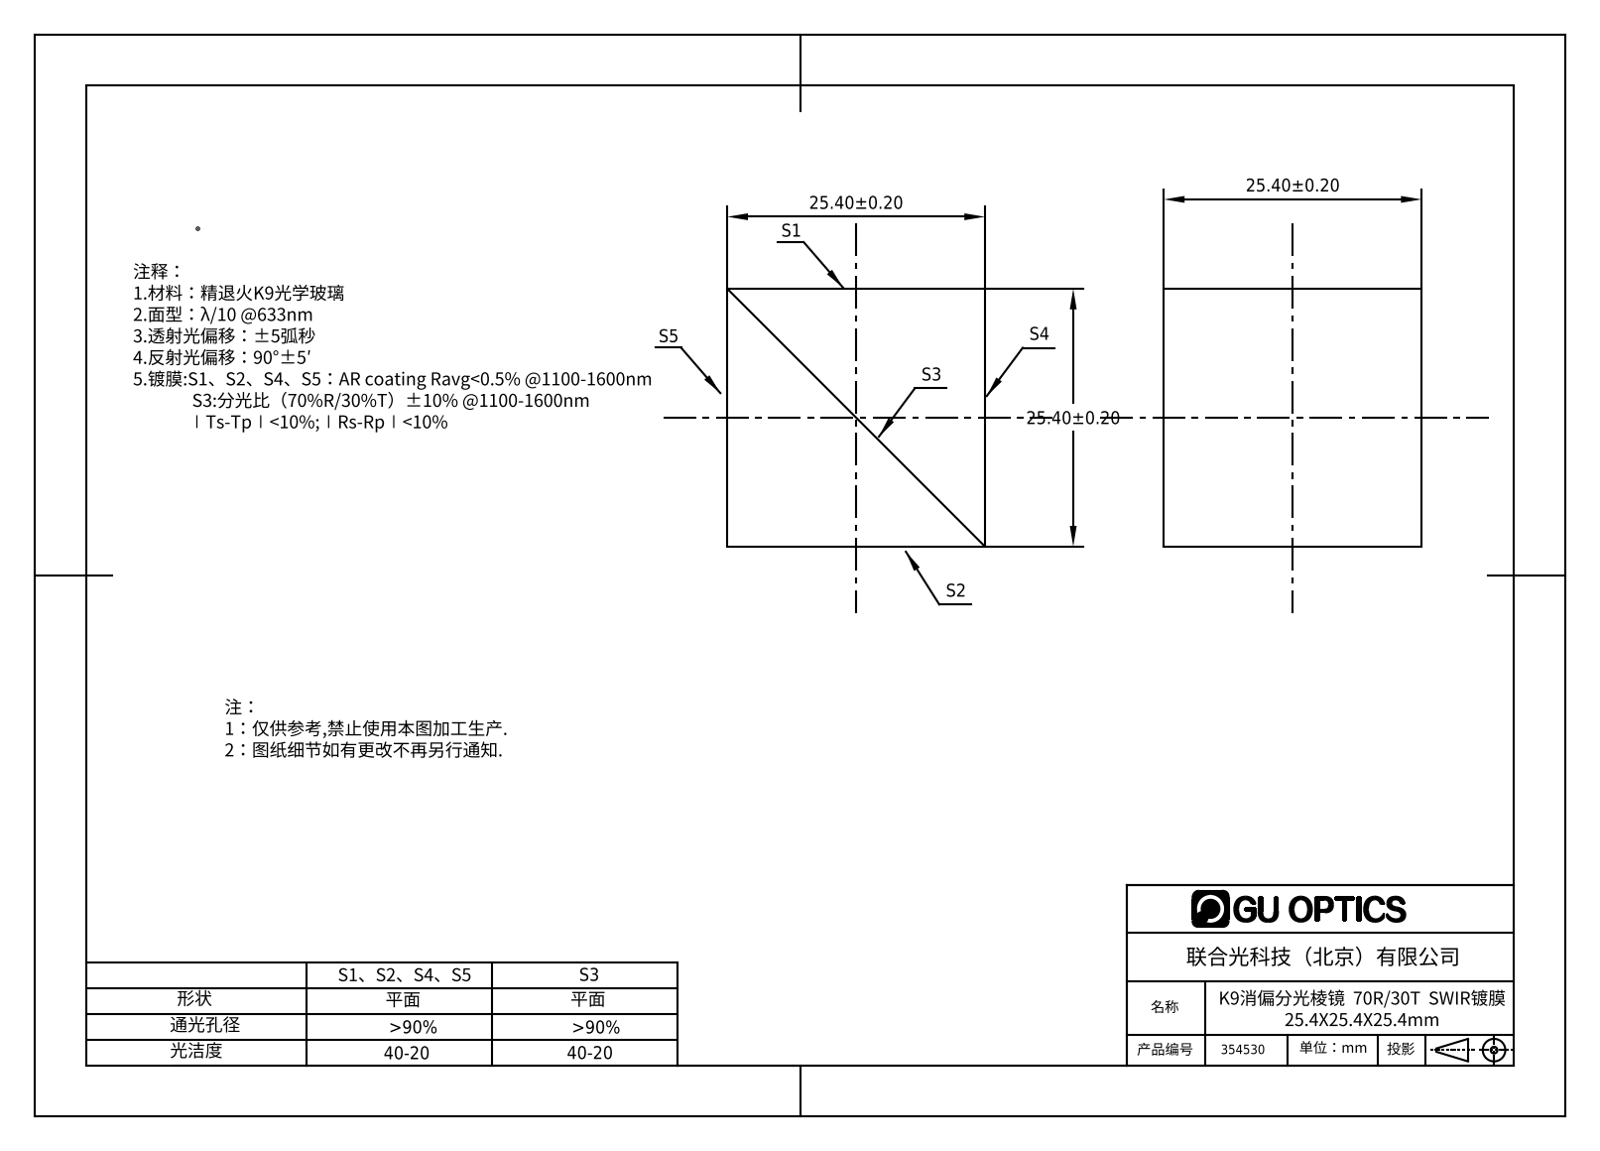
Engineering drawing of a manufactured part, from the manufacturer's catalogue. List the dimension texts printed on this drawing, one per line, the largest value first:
25.40±0.20
25.40±0.20
25.40±0.20
